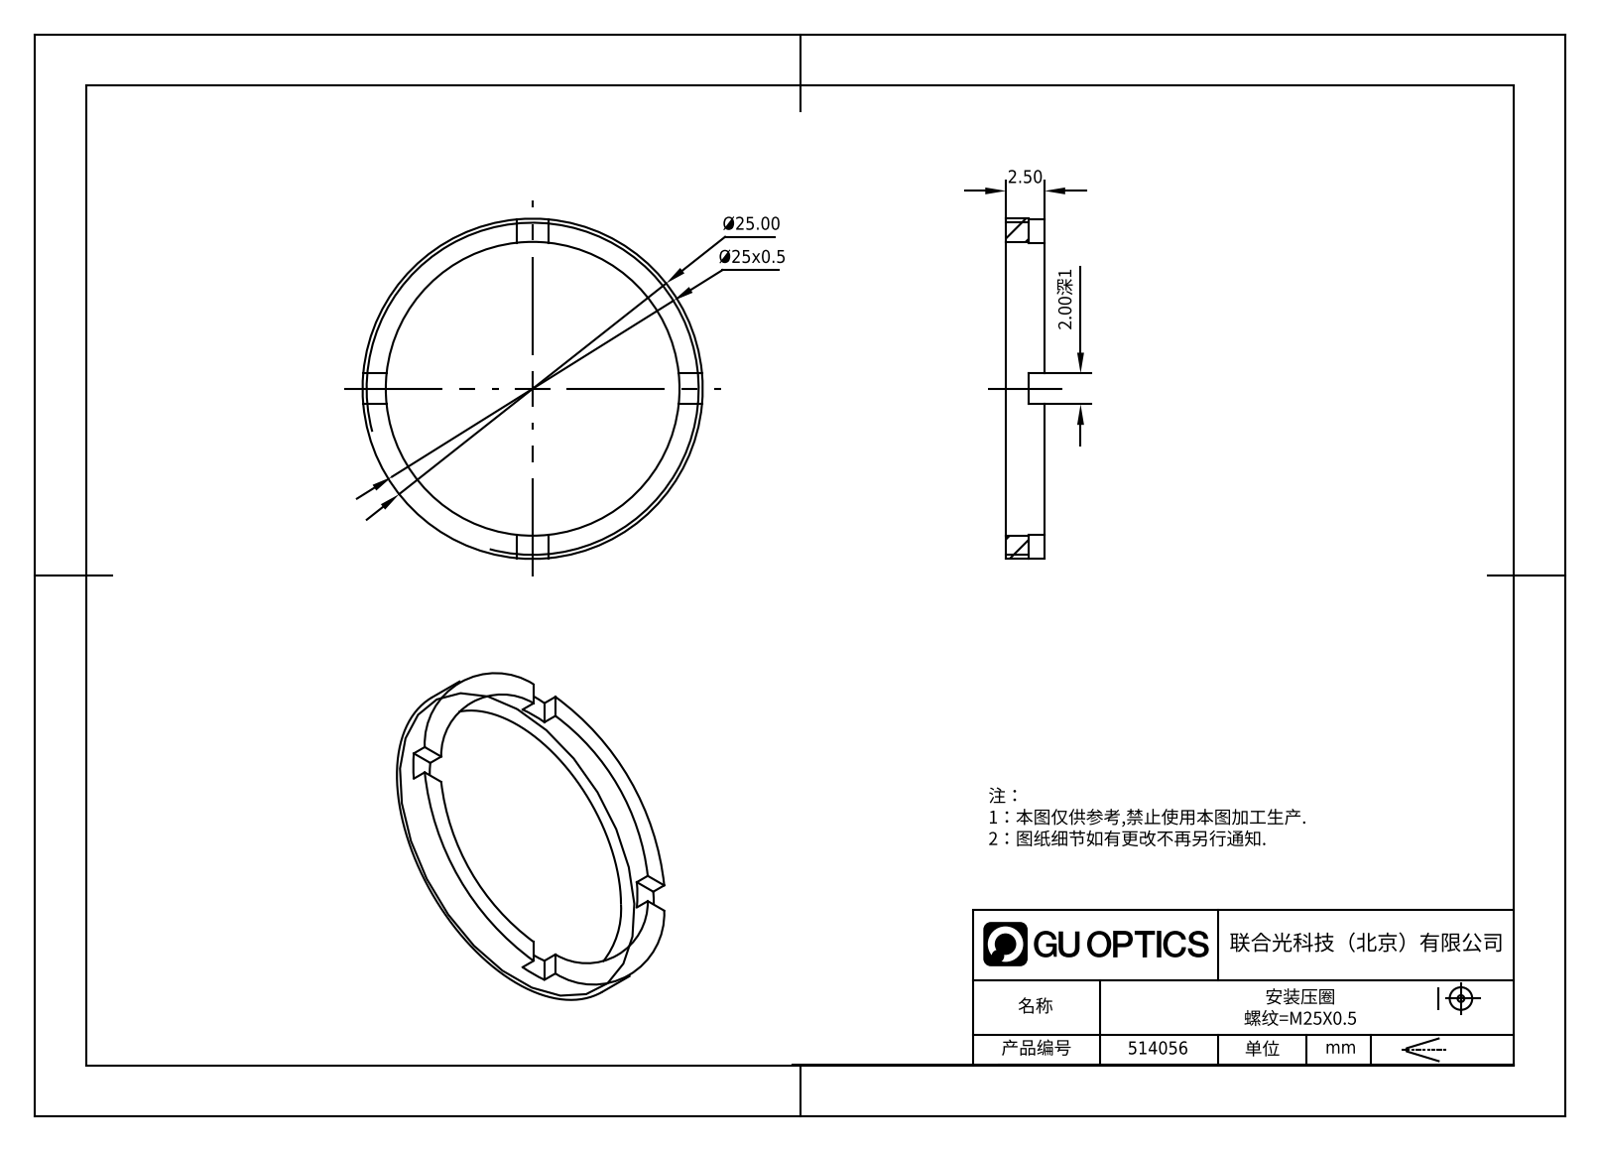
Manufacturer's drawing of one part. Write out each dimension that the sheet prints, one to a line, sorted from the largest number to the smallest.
Ø25.00
Ø25x0.5
2.50
2.00深1
